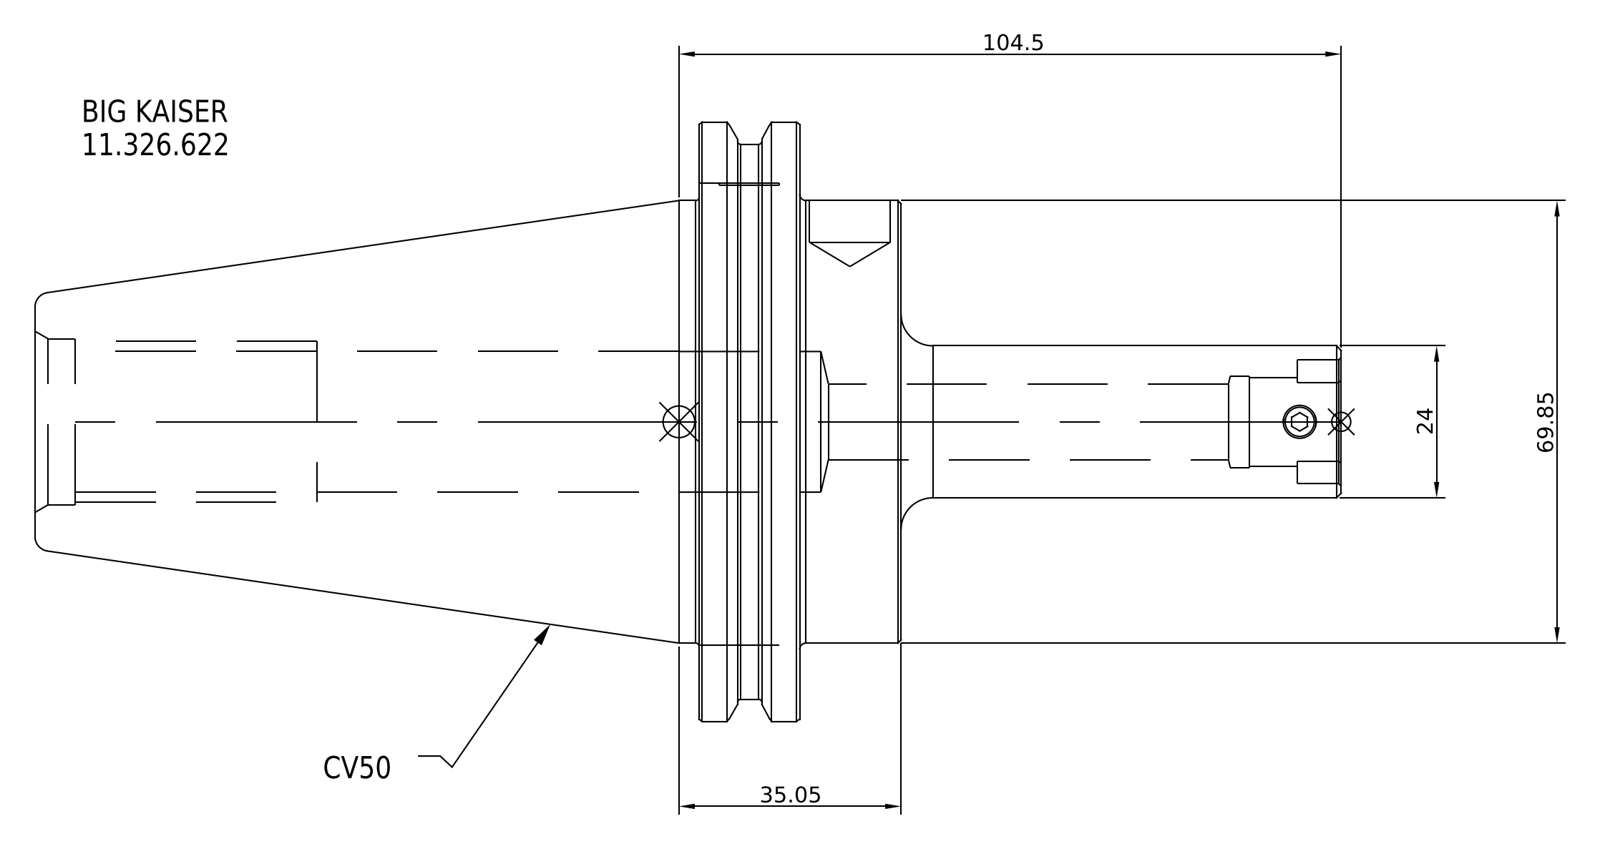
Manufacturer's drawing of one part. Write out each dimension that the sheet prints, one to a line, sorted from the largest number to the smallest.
104.5
69.85
35.05
24
